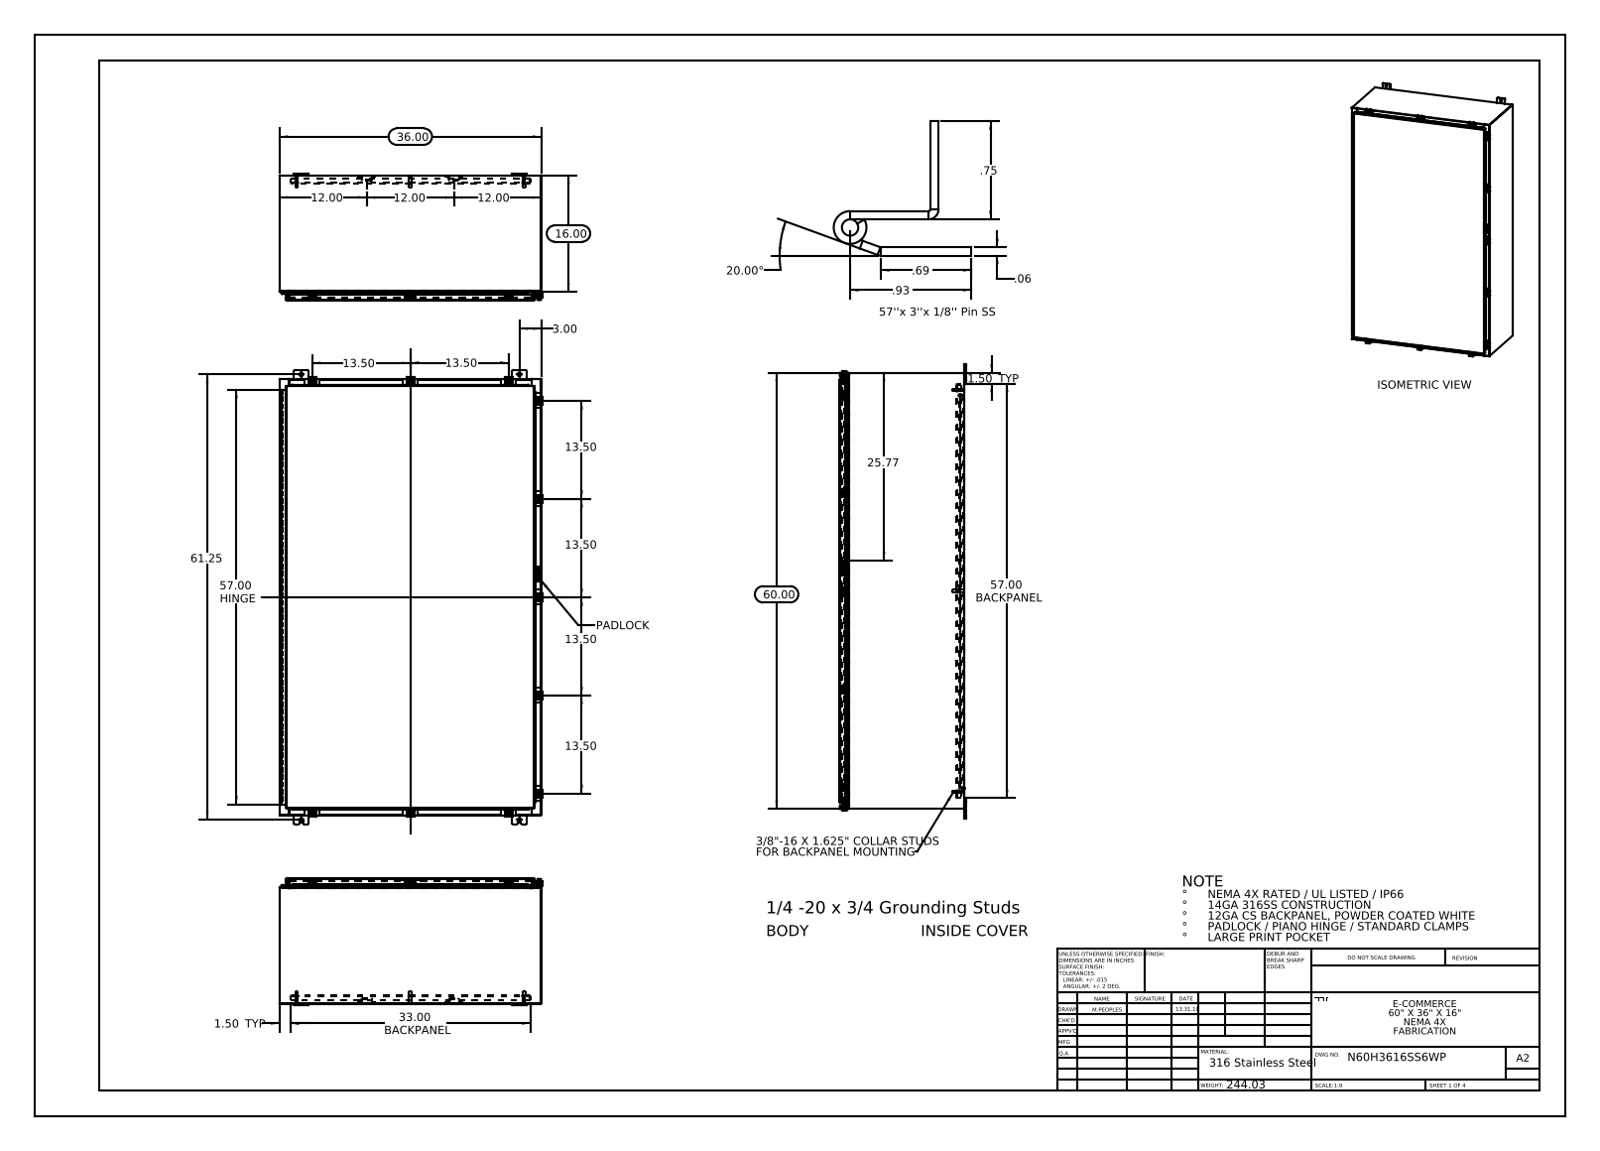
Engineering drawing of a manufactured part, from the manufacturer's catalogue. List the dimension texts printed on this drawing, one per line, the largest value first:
61.25
60.00
57.00 HINGE
57.00 BACKPANEL
36.00
33.00 BACKPANEL
25.77
20.00°
16.00
13.50
13.50
13.50
13.50
13.50
13.50
12.00
12.00
12.00
3.00
1.50 TYP
1.50 TYP
.93
.75
.69
.06
